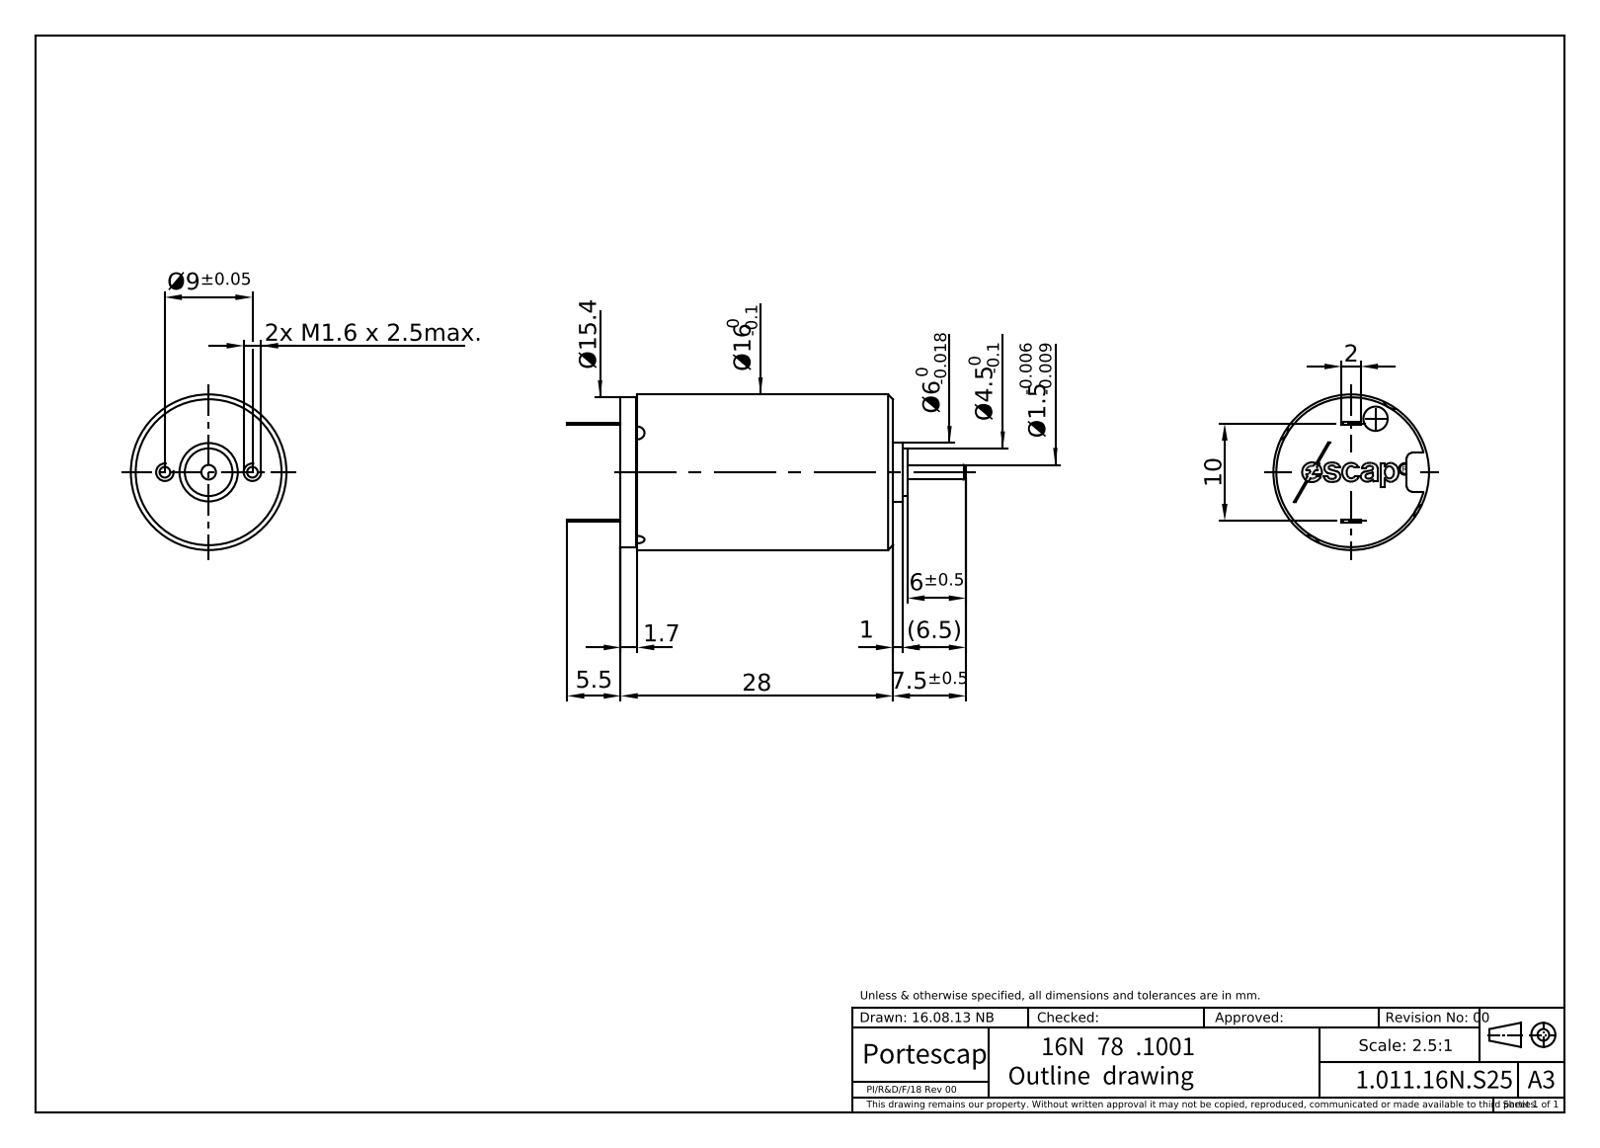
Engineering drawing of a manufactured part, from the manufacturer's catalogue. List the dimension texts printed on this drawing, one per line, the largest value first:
28
10
Ø9±0.05
7.5±0.5
(6.5)
6±0.5
5.5
2
1.7
2x M1.6 x 2.5max.
1
